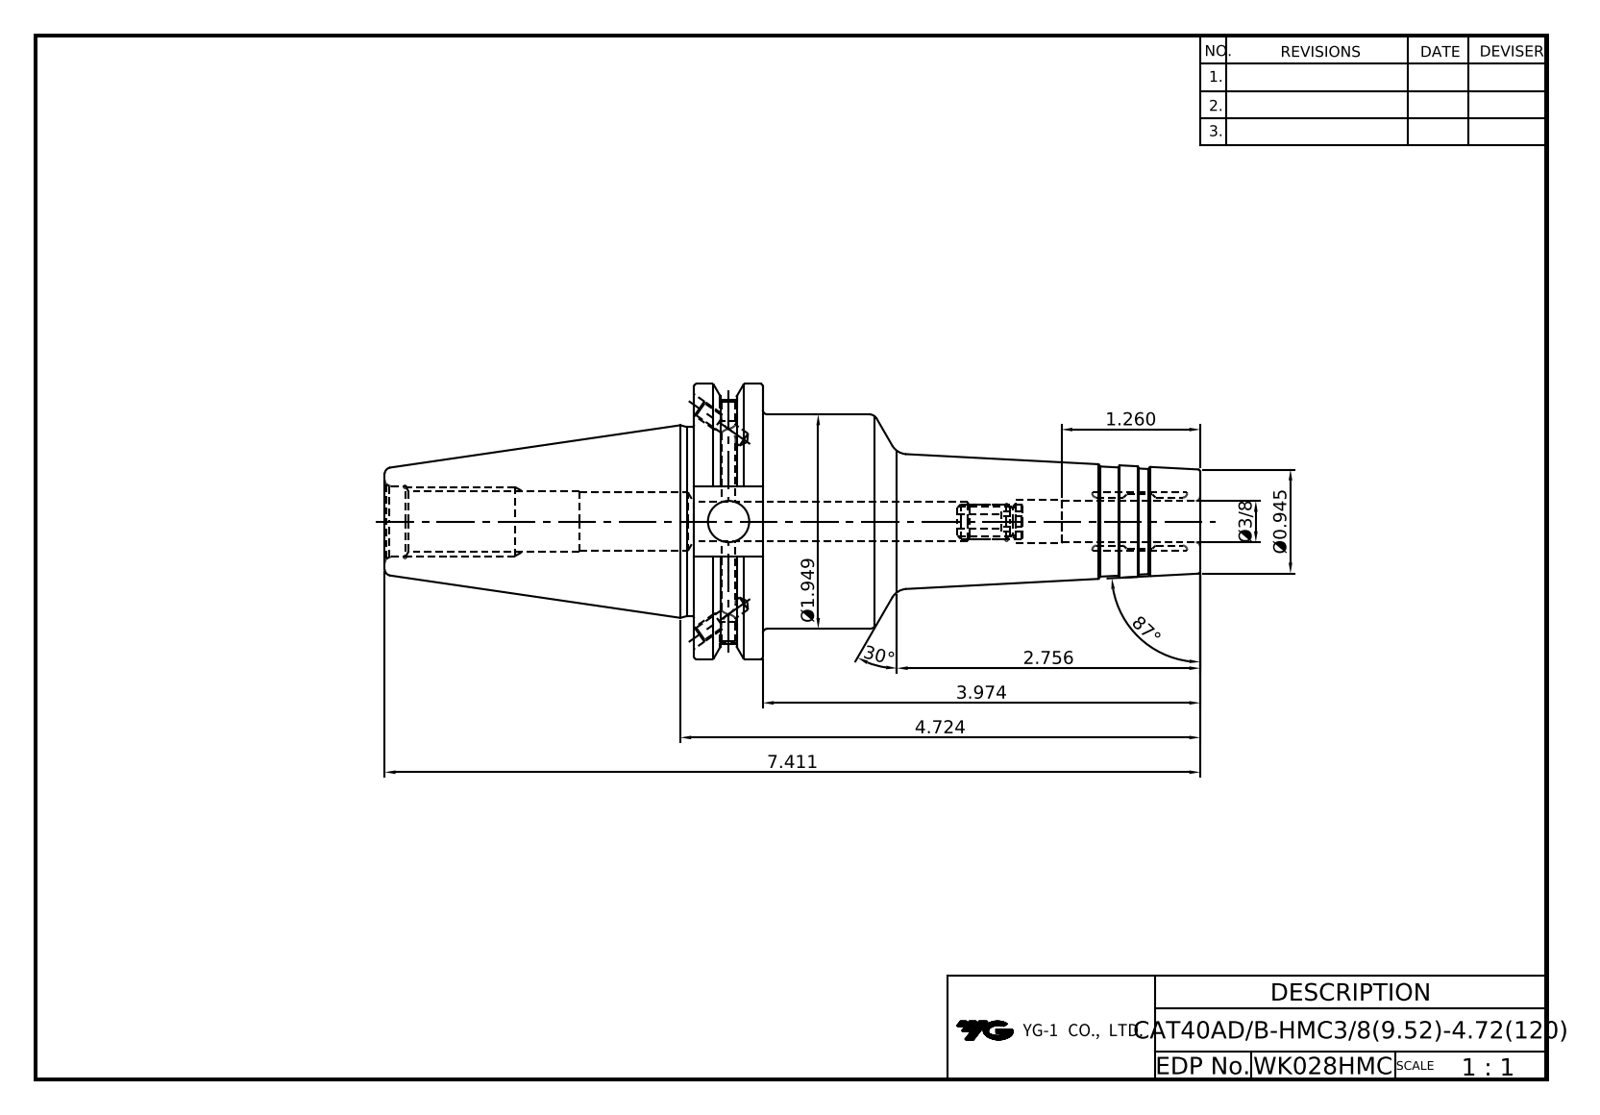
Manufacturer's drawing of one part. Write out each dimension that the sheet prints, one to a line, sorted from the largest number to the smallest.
87°
30°
7.411
4.724
3.974
2.756
Ø1.949
1.260
Ø0.945
Ø3/8
